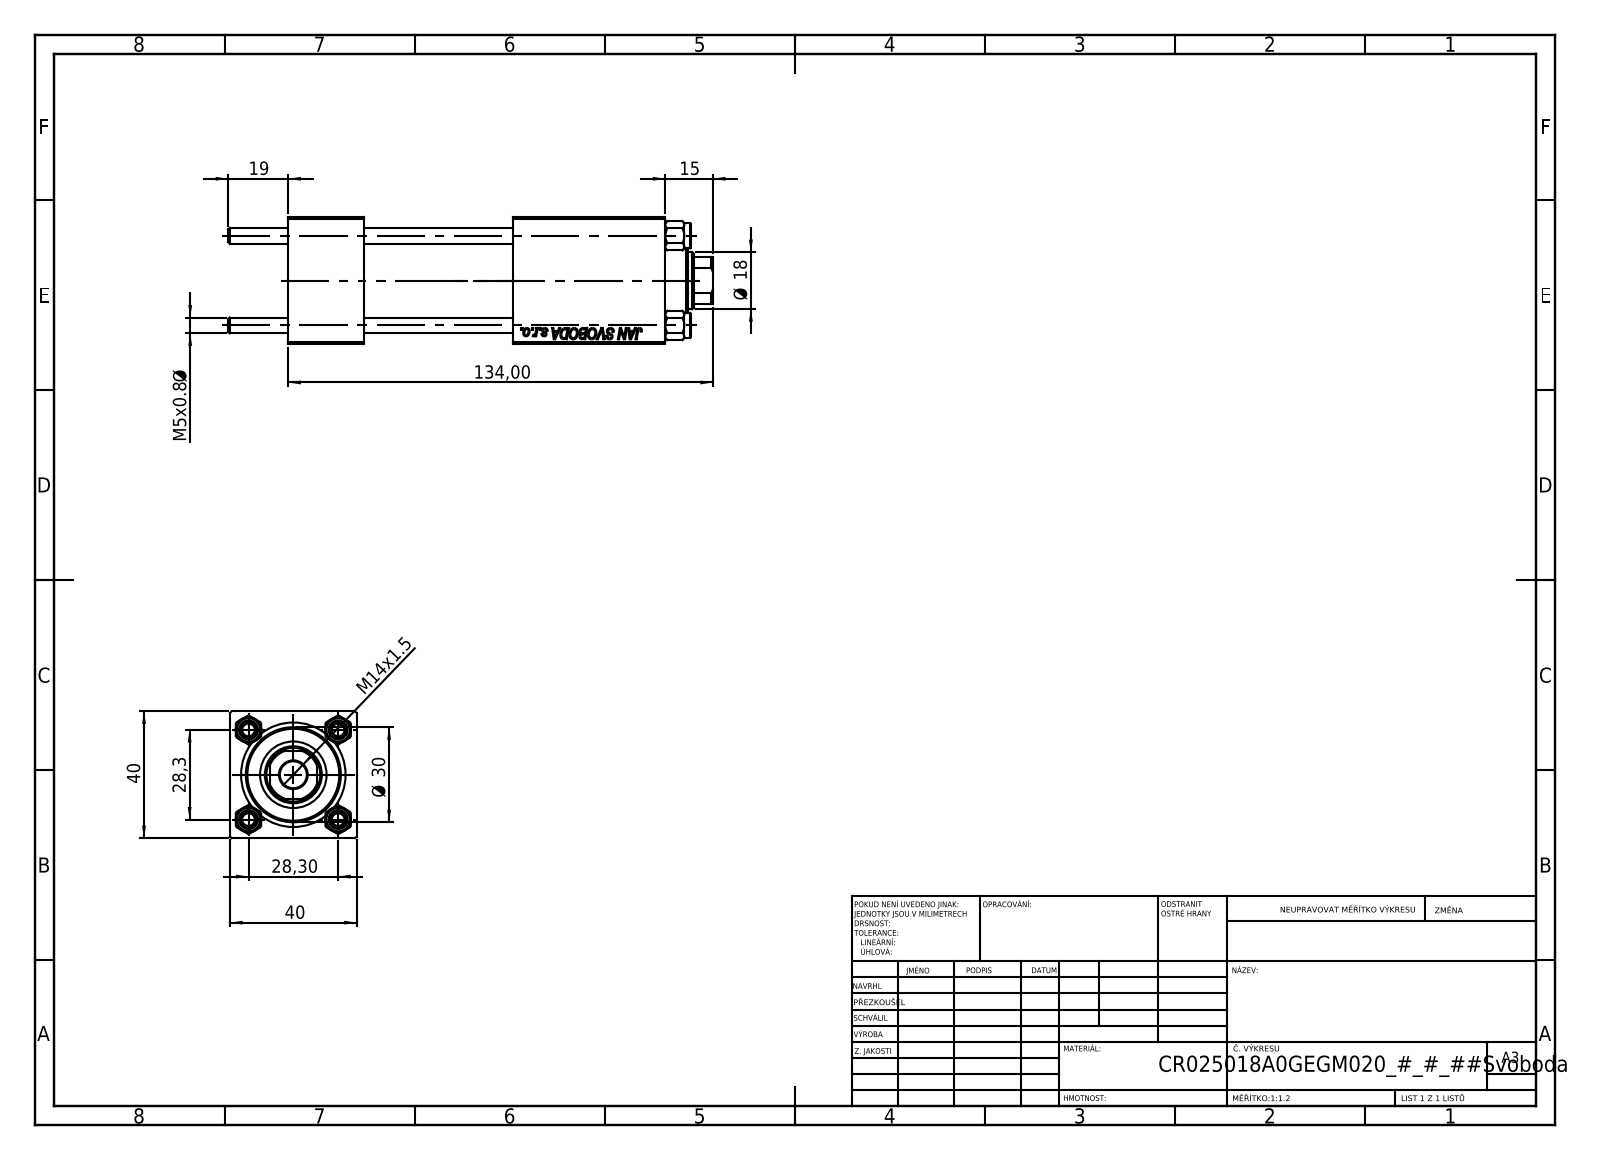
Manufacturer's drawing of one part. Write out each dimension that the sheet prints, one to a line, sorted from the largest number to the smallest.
134,00
40
40
Ø 30
28,3
28,30
19
Ø 18
15
M14x1.5
M5x0.8 Ø
